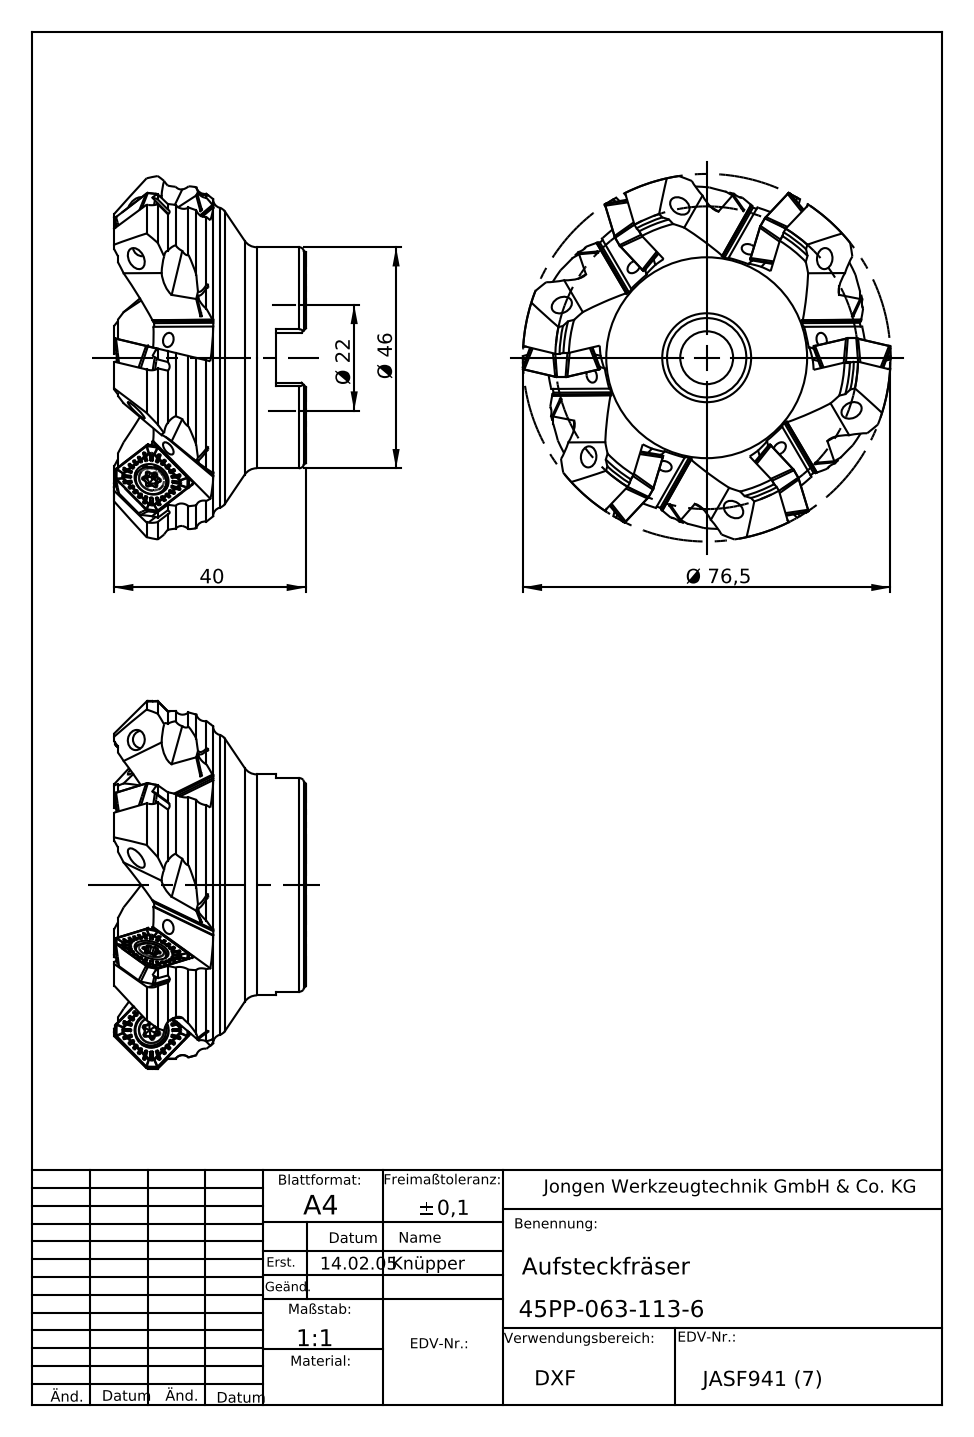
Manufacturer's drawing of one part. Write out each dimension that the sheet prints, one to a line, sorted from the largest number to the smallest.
Ø 76,5
Ø 46
40
Ø 22
